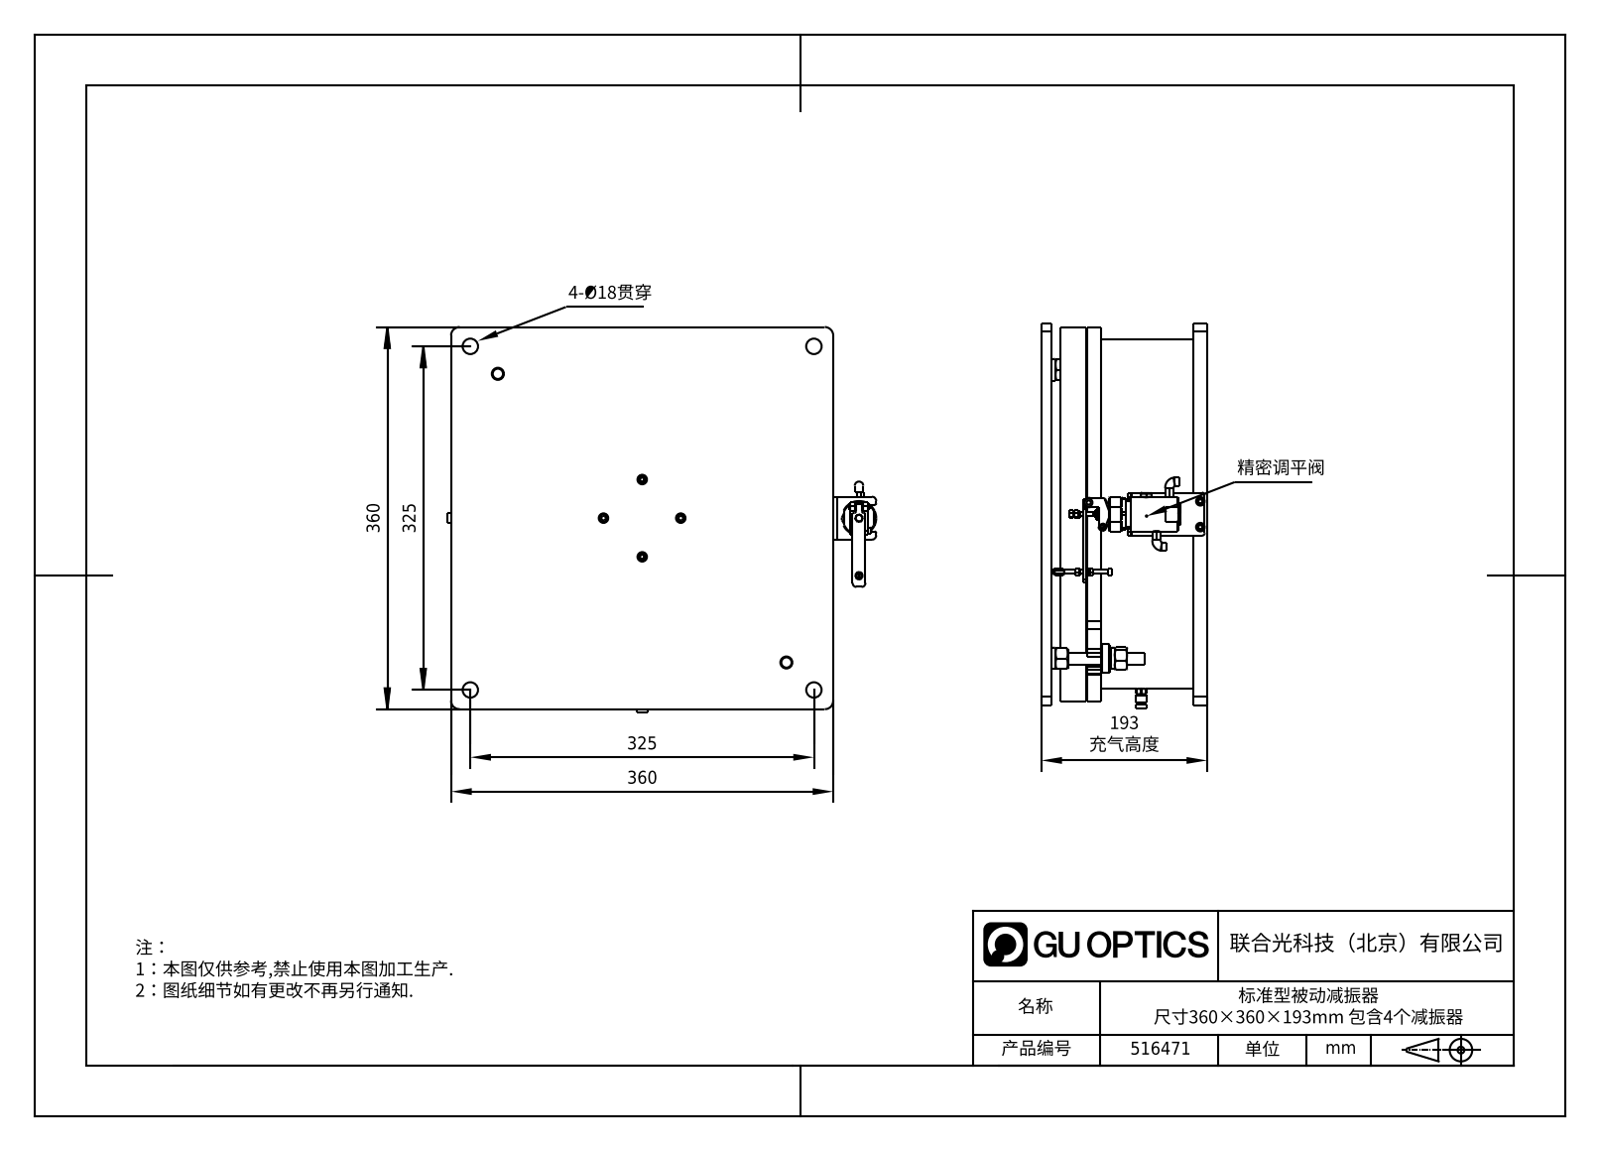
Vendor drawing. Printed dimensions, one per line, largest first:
360
360
325
325
193 充气高度
